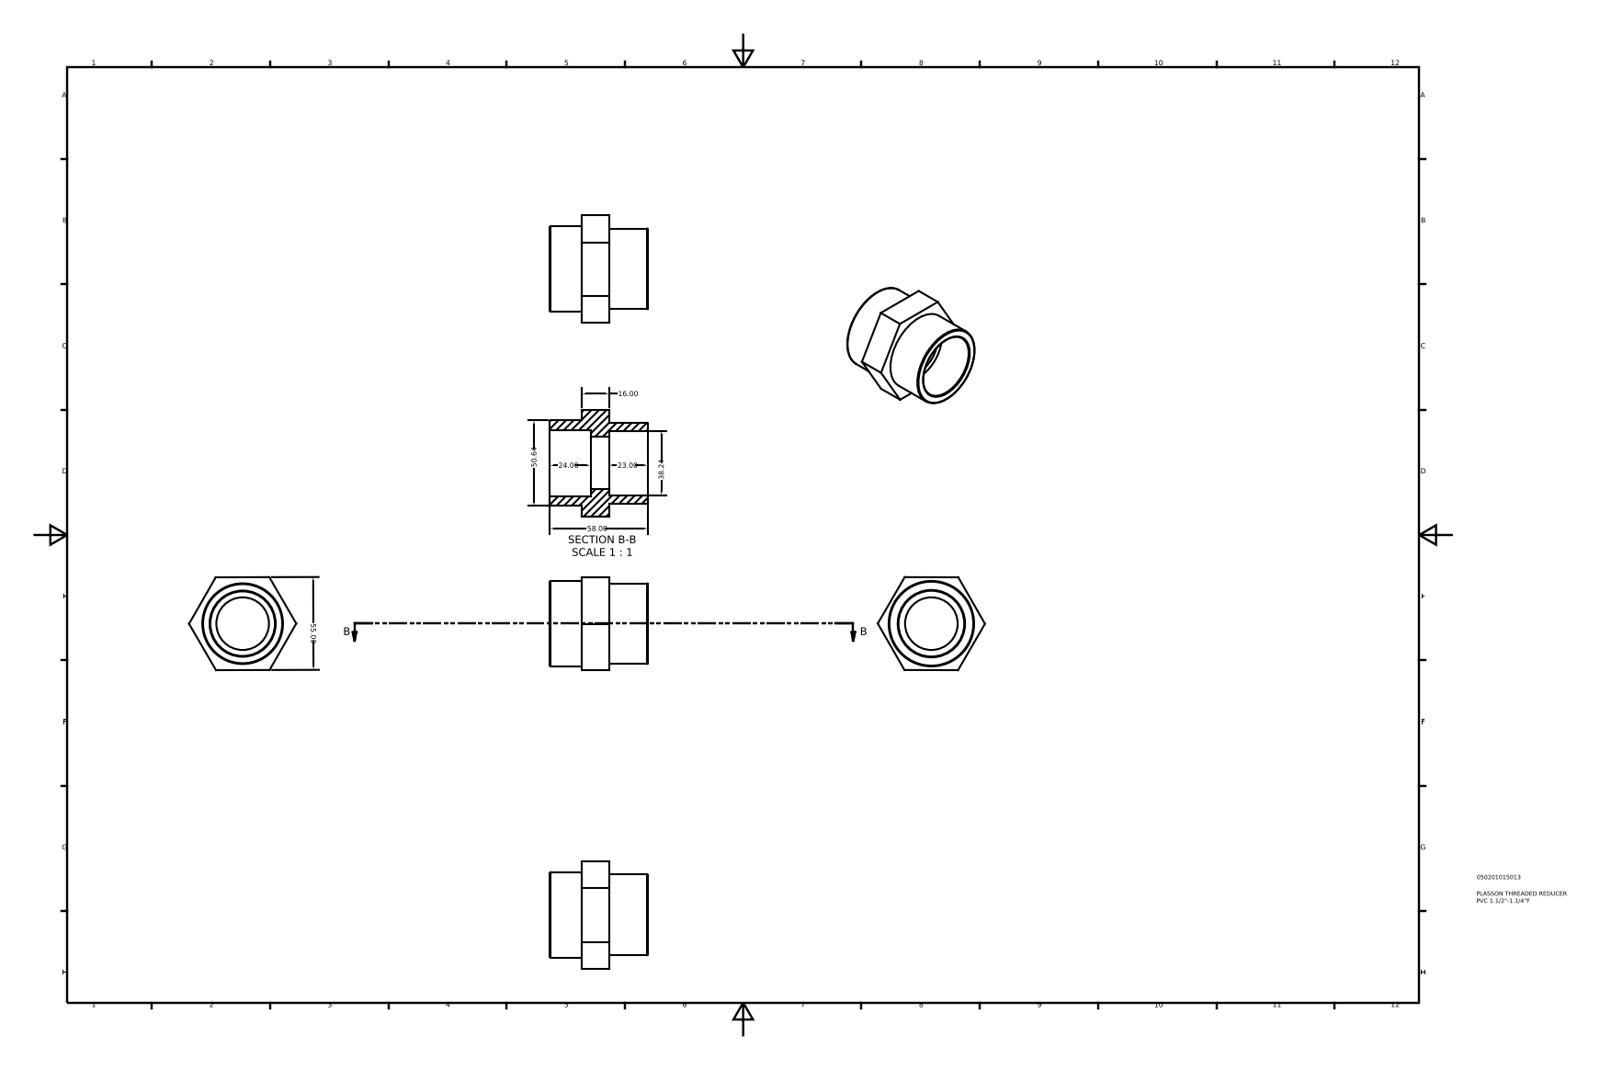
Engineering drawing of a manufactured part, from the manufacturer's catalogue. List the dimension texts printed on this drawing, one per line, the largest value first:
58.00
55.00
50.64
38.24
24.00
23.00
16.00
